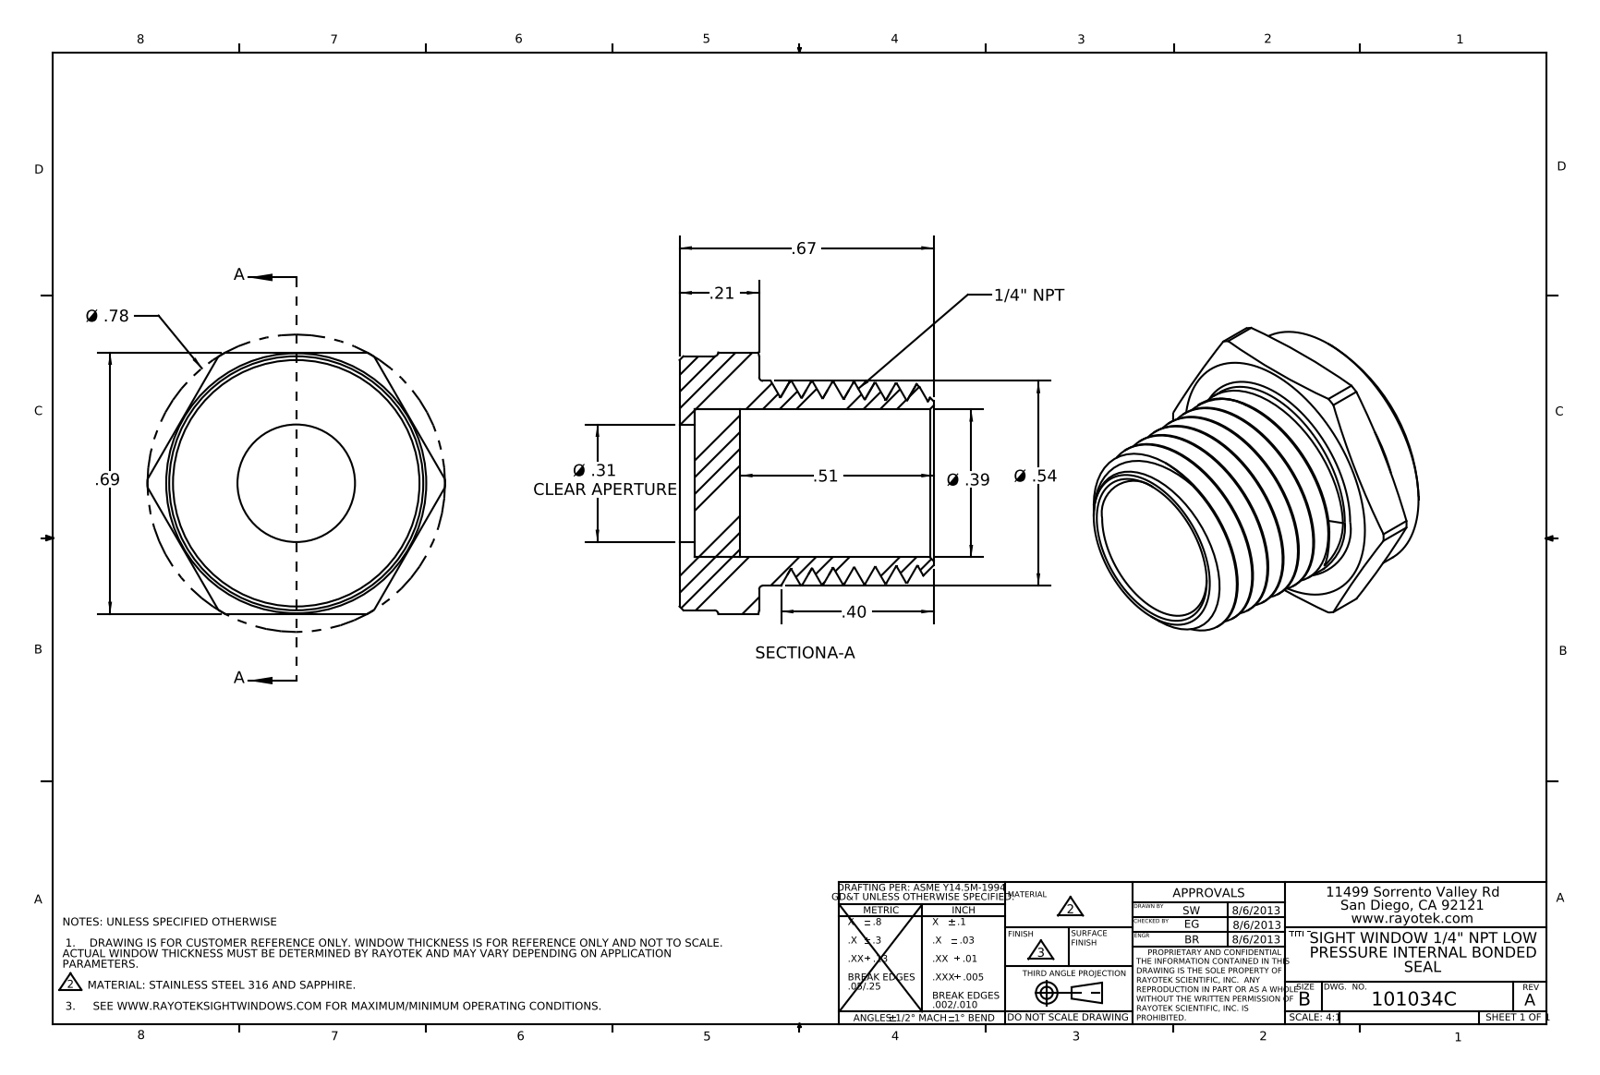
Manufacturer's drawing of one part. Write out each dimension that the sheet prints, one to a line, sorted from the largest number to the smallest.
Ø .78
.69
.67
Ø .54
.51
.40
Ø .39
Ø .31 CLEAR APERTURE
.21
